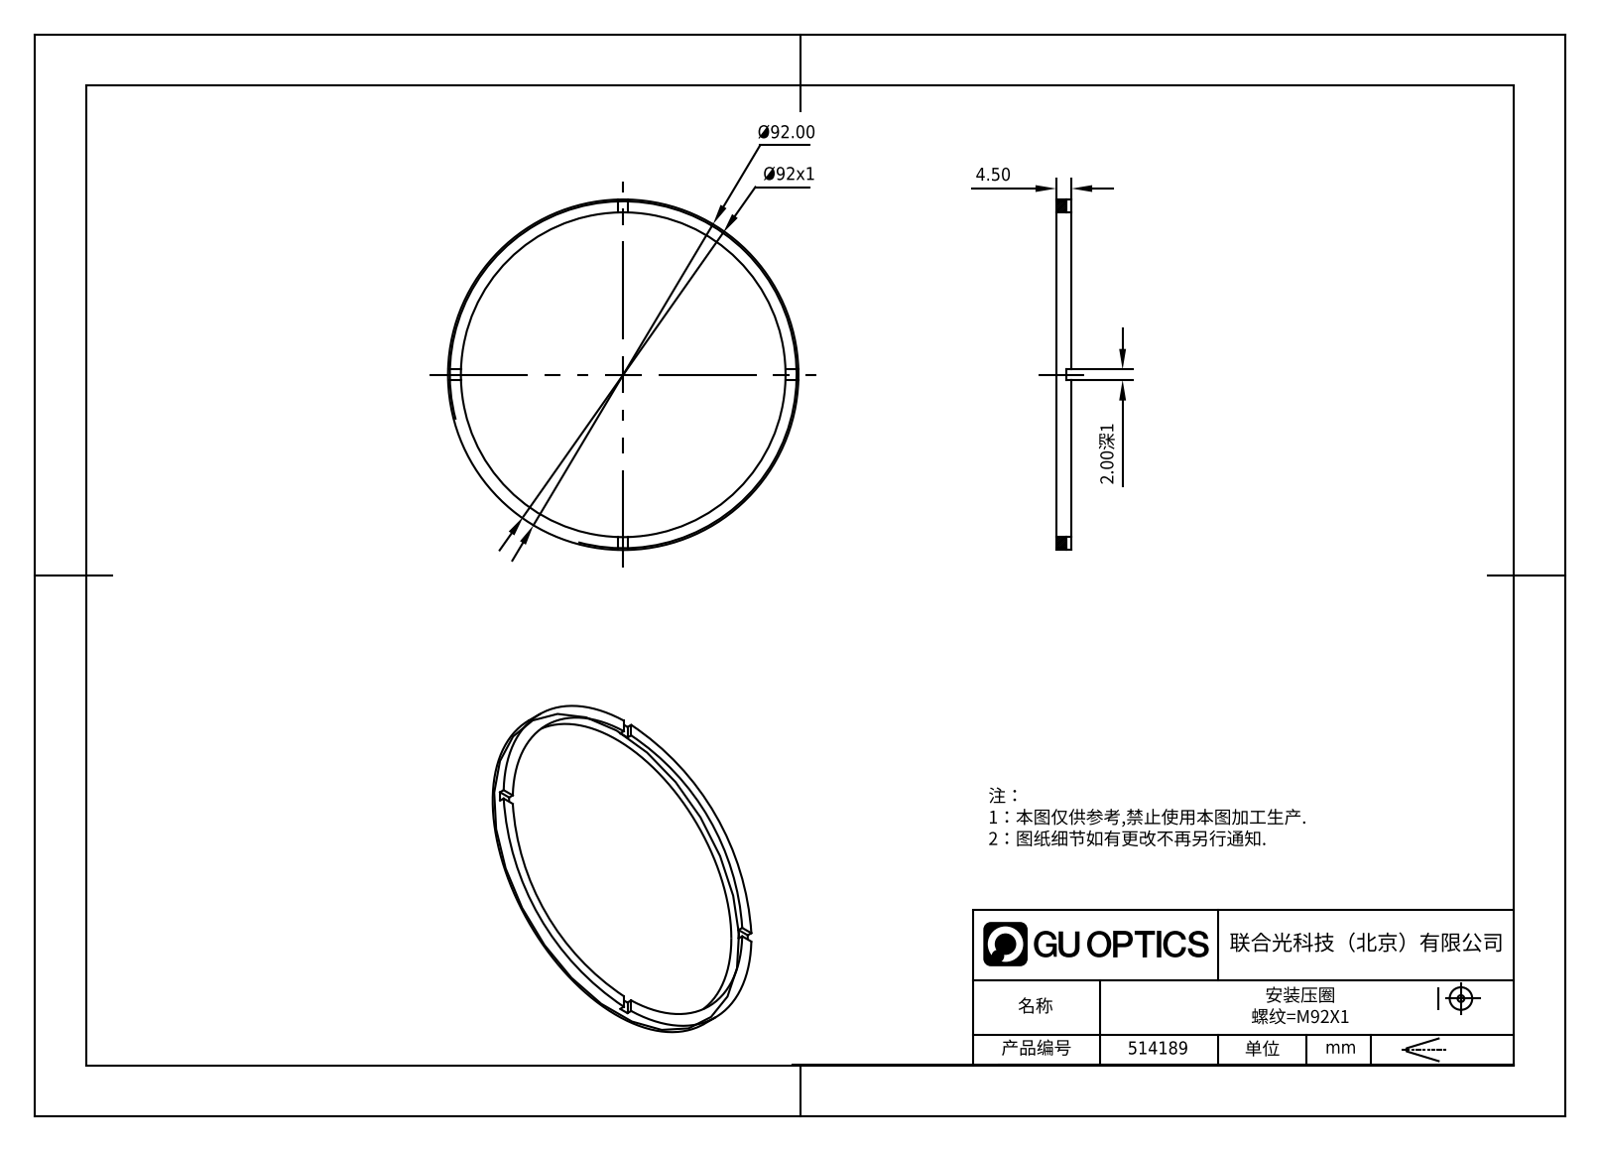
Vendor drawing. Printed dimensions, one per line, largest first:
Ø92.00
Ø92x1
4.50
2.00深1
